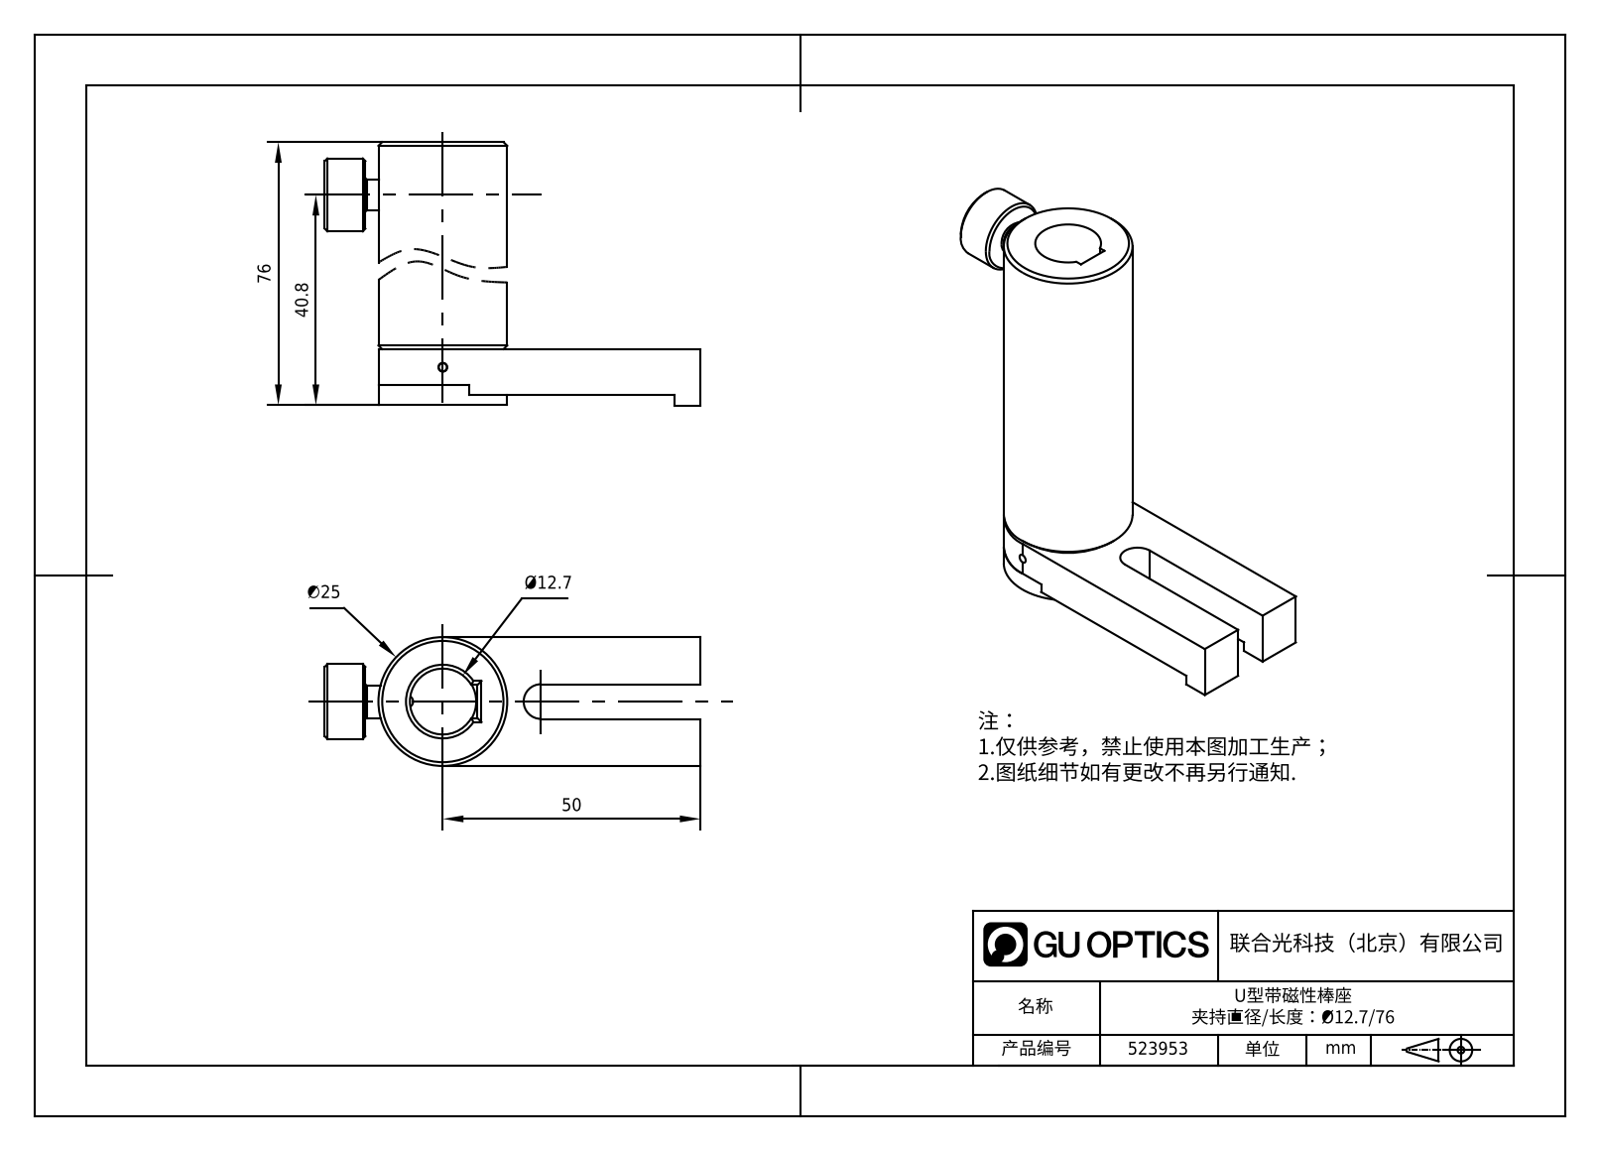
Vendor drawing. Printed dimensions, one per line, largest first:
76
50
40.8
∅25
Ø12.7
